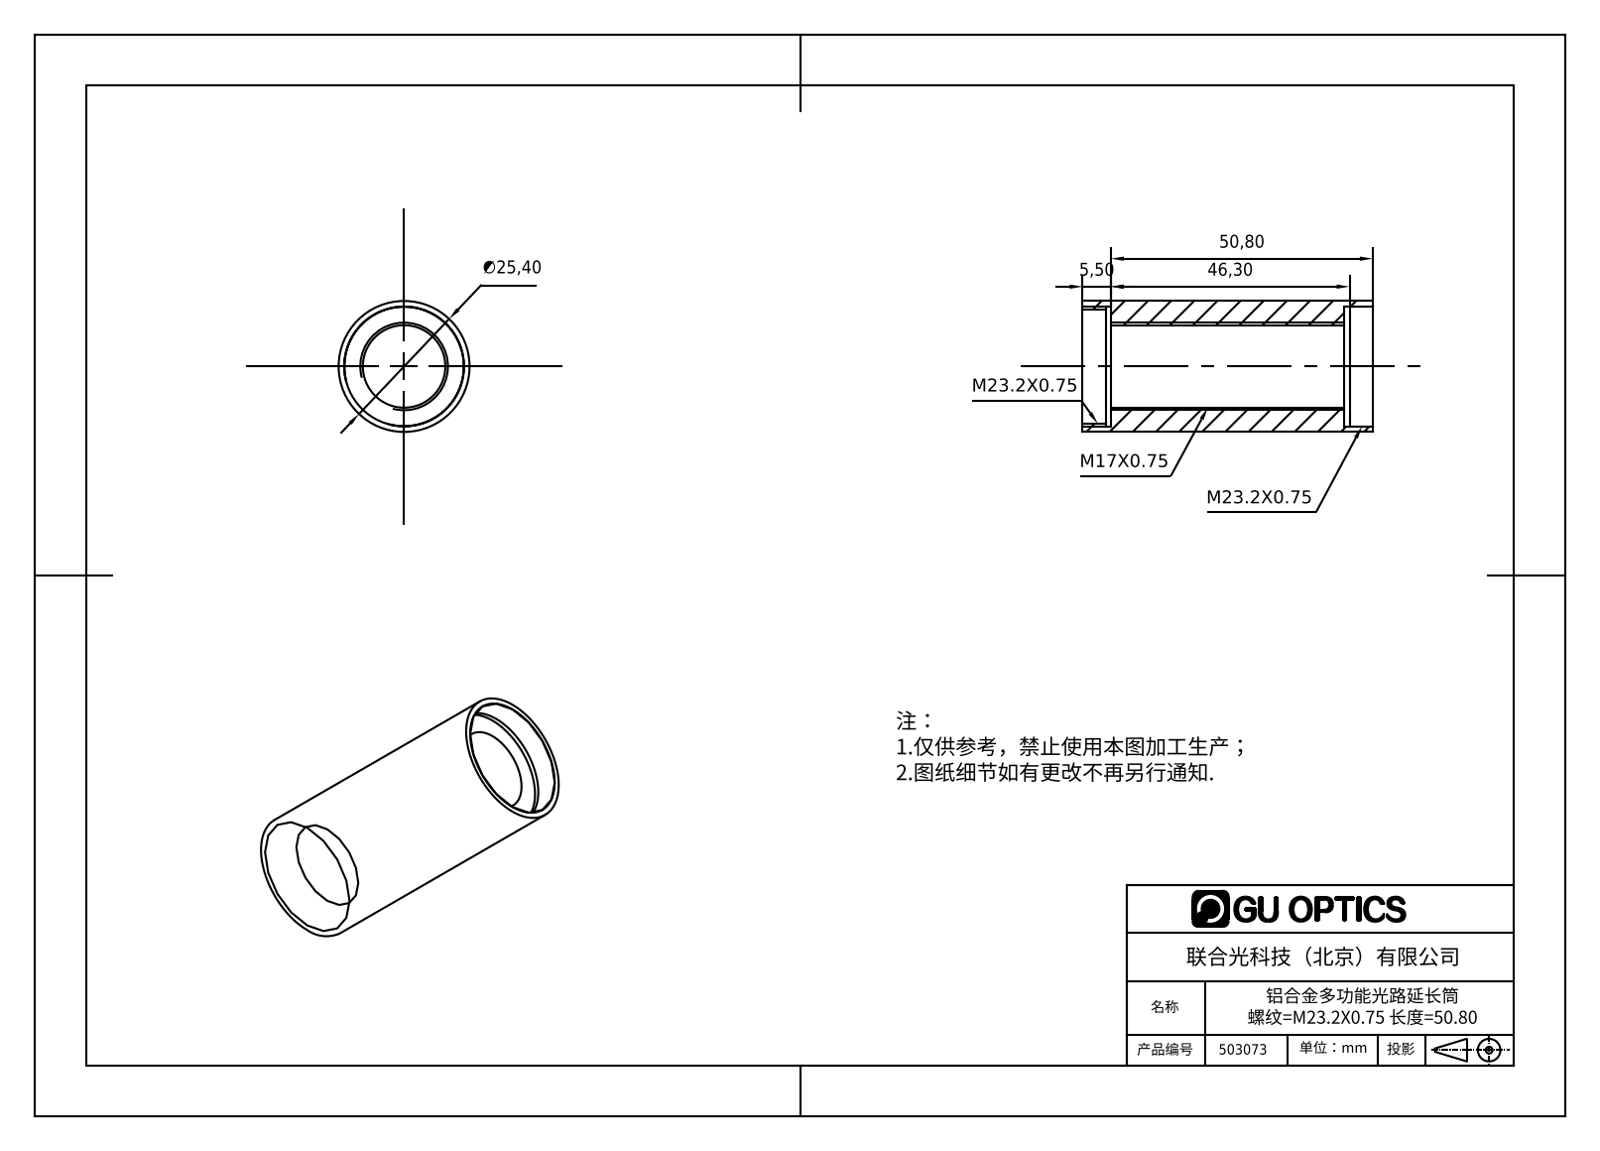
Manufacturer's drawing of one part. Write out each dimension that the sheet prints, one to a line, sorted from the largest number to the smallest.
50,80
46,30
∅25,40
5,50
